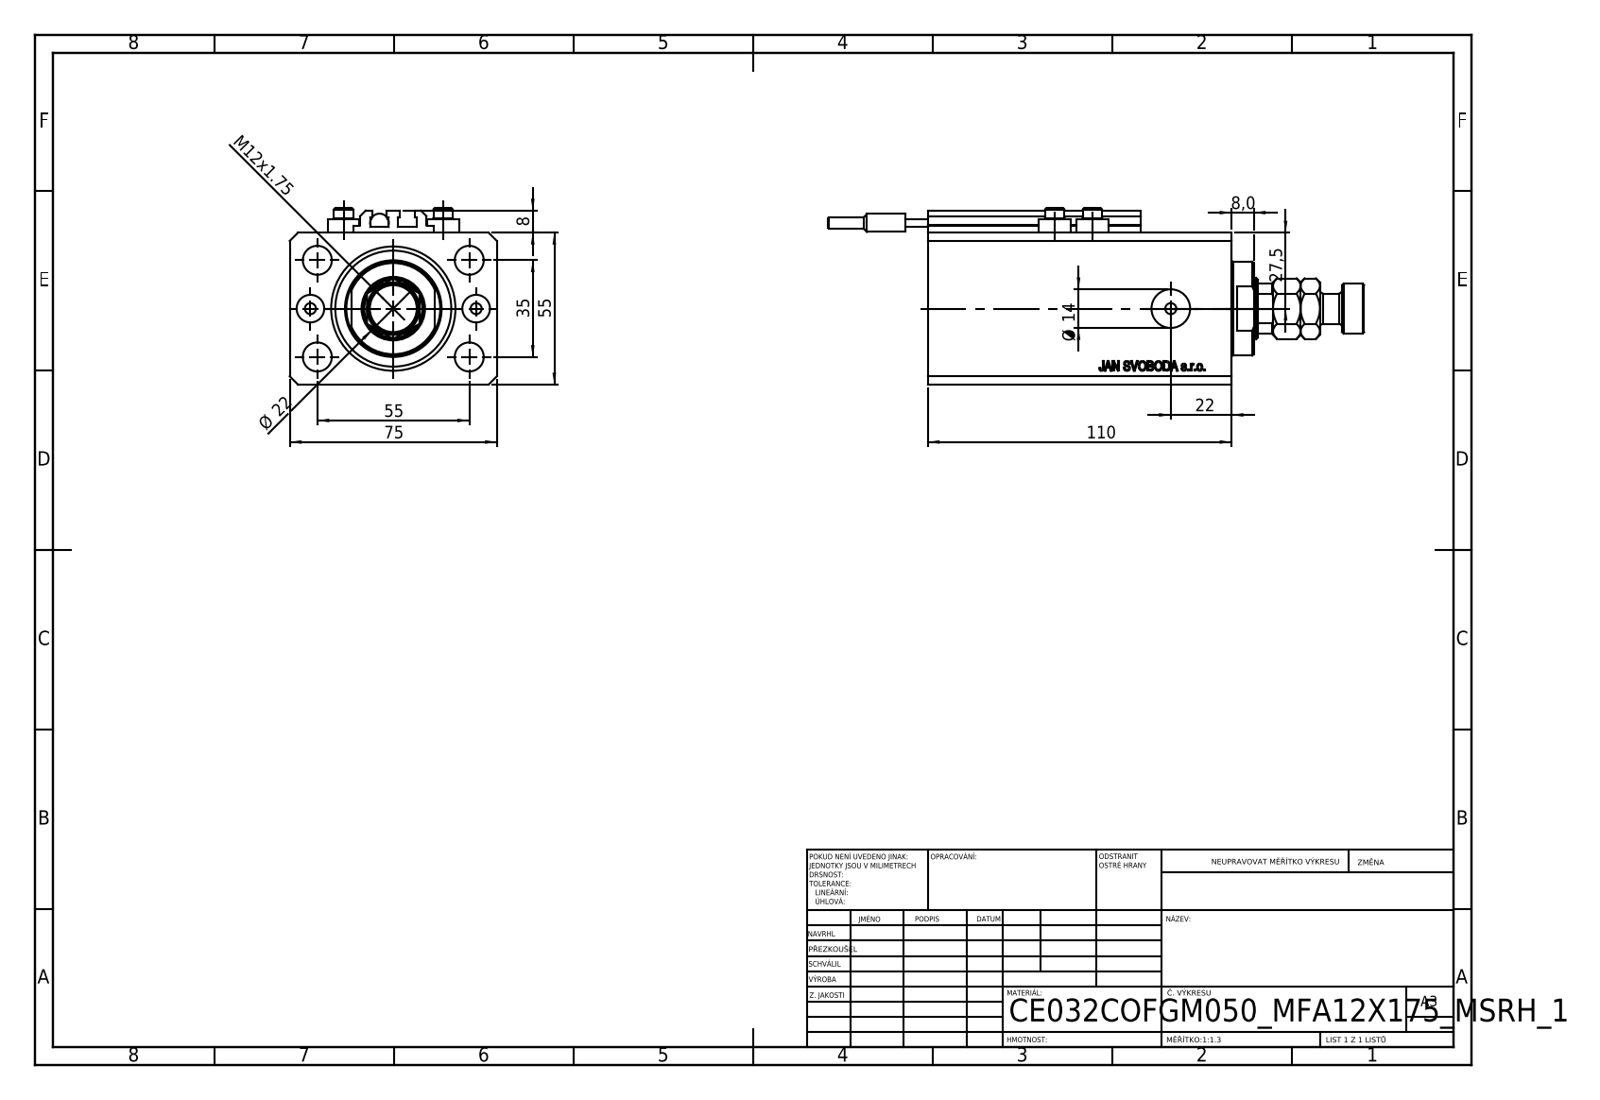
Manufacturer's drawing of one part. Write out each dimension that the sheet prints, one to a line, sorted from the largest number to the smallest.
110
75
55
55
35
27,5
Ø 22
22
Ø 14
M12x1.75
8
8,0
